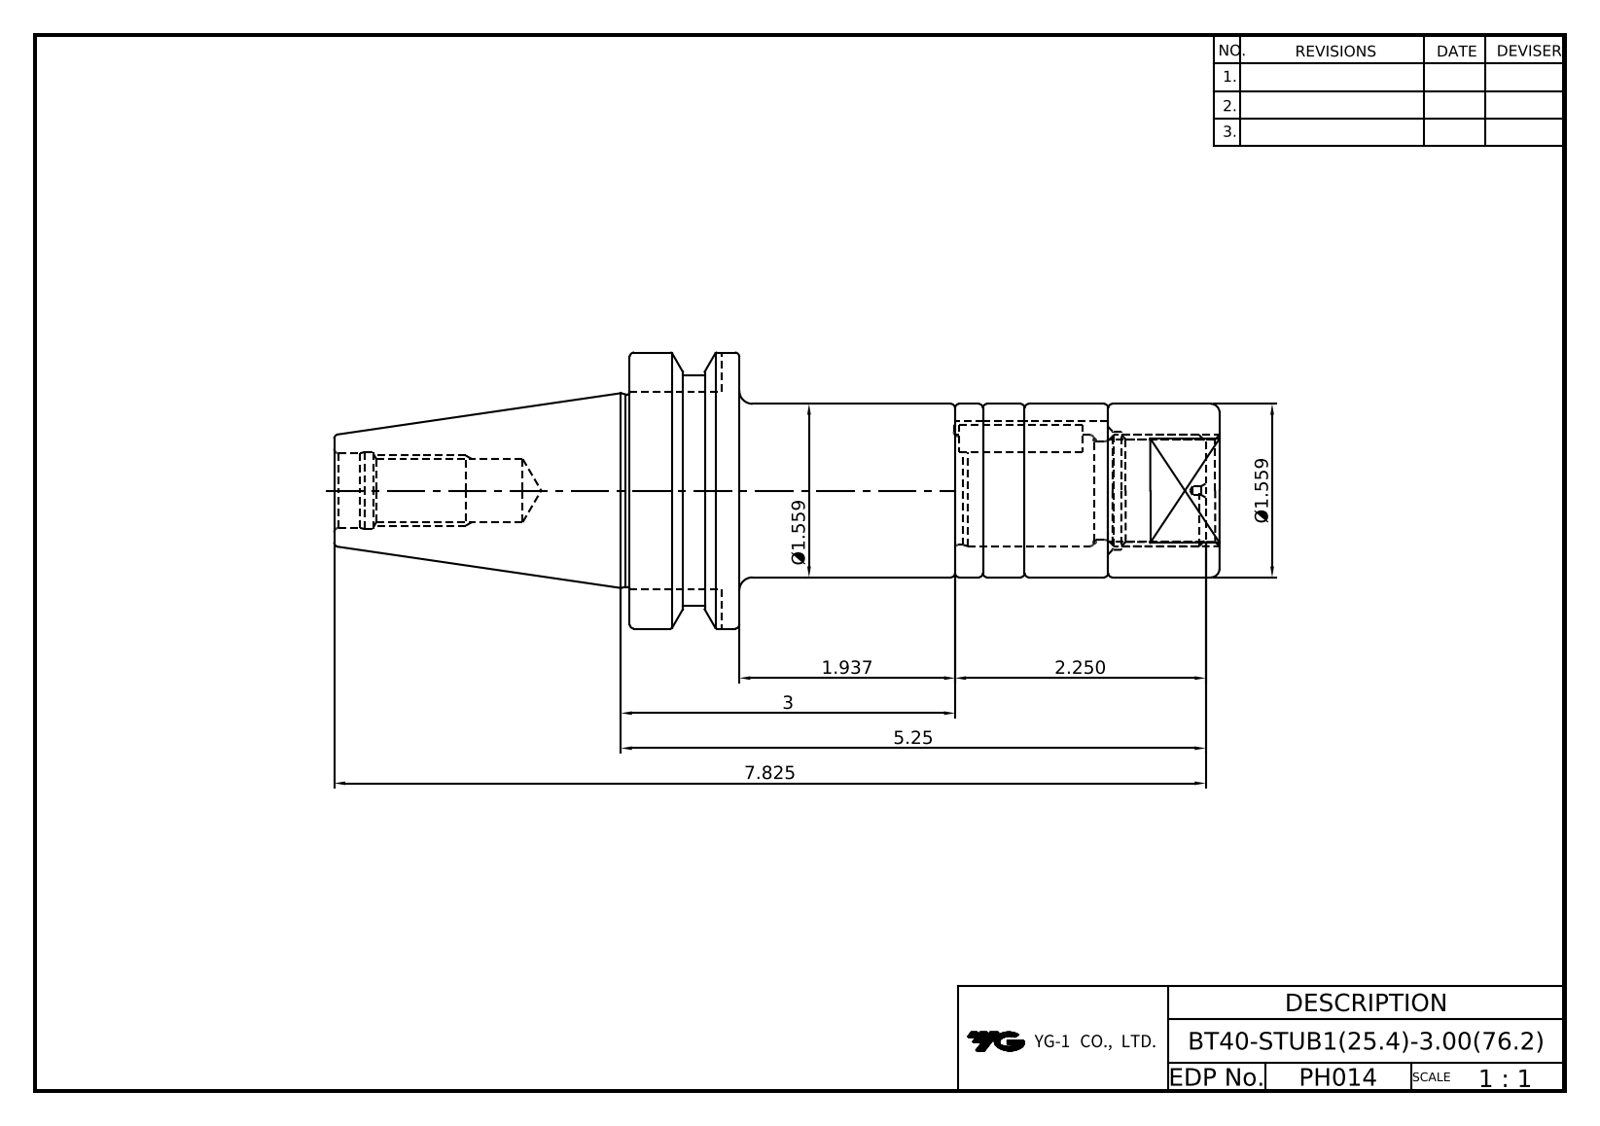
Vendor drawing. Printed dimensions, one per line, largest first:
7.825
5.25
3
2.250
1.937
Ø1.559
Ø1.559
